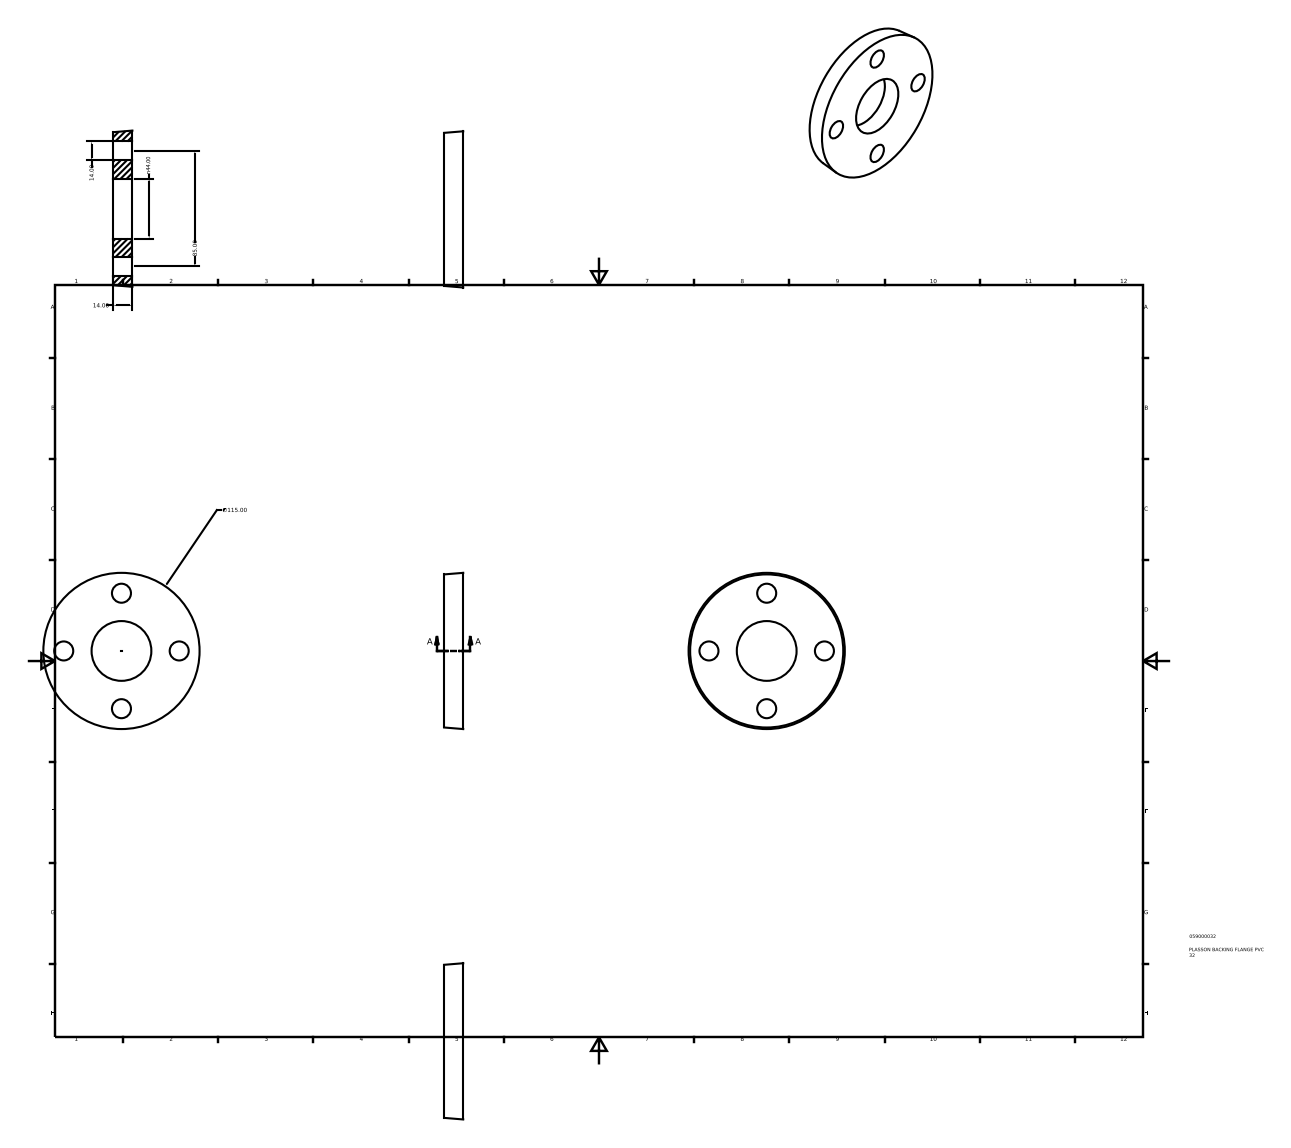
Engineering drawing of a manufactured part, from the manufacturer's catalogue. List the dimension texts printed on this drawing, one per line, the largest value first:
∅115.00
85.00
n44.00
14.00
14.00
